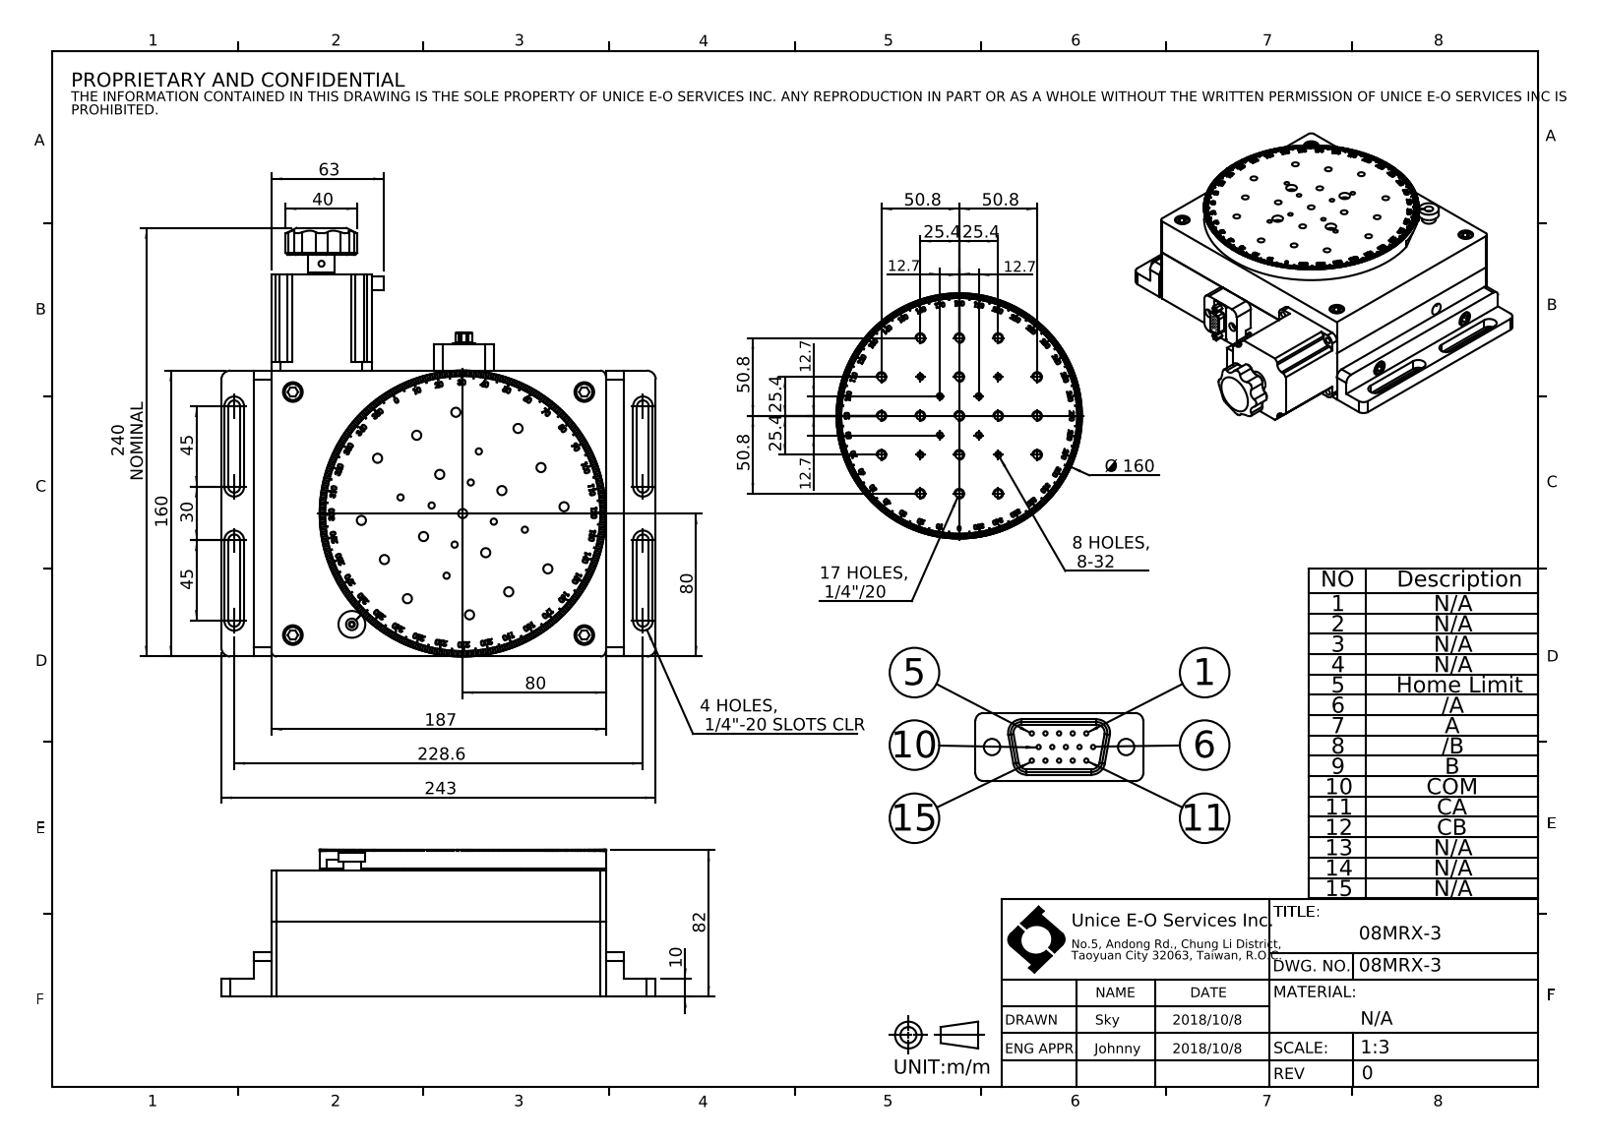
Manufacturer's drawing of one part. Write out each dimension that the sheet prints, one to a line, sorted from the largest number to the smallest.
243
240 NOMINAL
228.6
187
160
Ø 160
82
80
80
63
50.8
50.8
50.8
50.8
45
45
40
30
25.4
25.4
25.4
25.4
12.7
12.7
12.7
12.7
10
4 HOLES, 1/4"-20 SLOTS CLR
